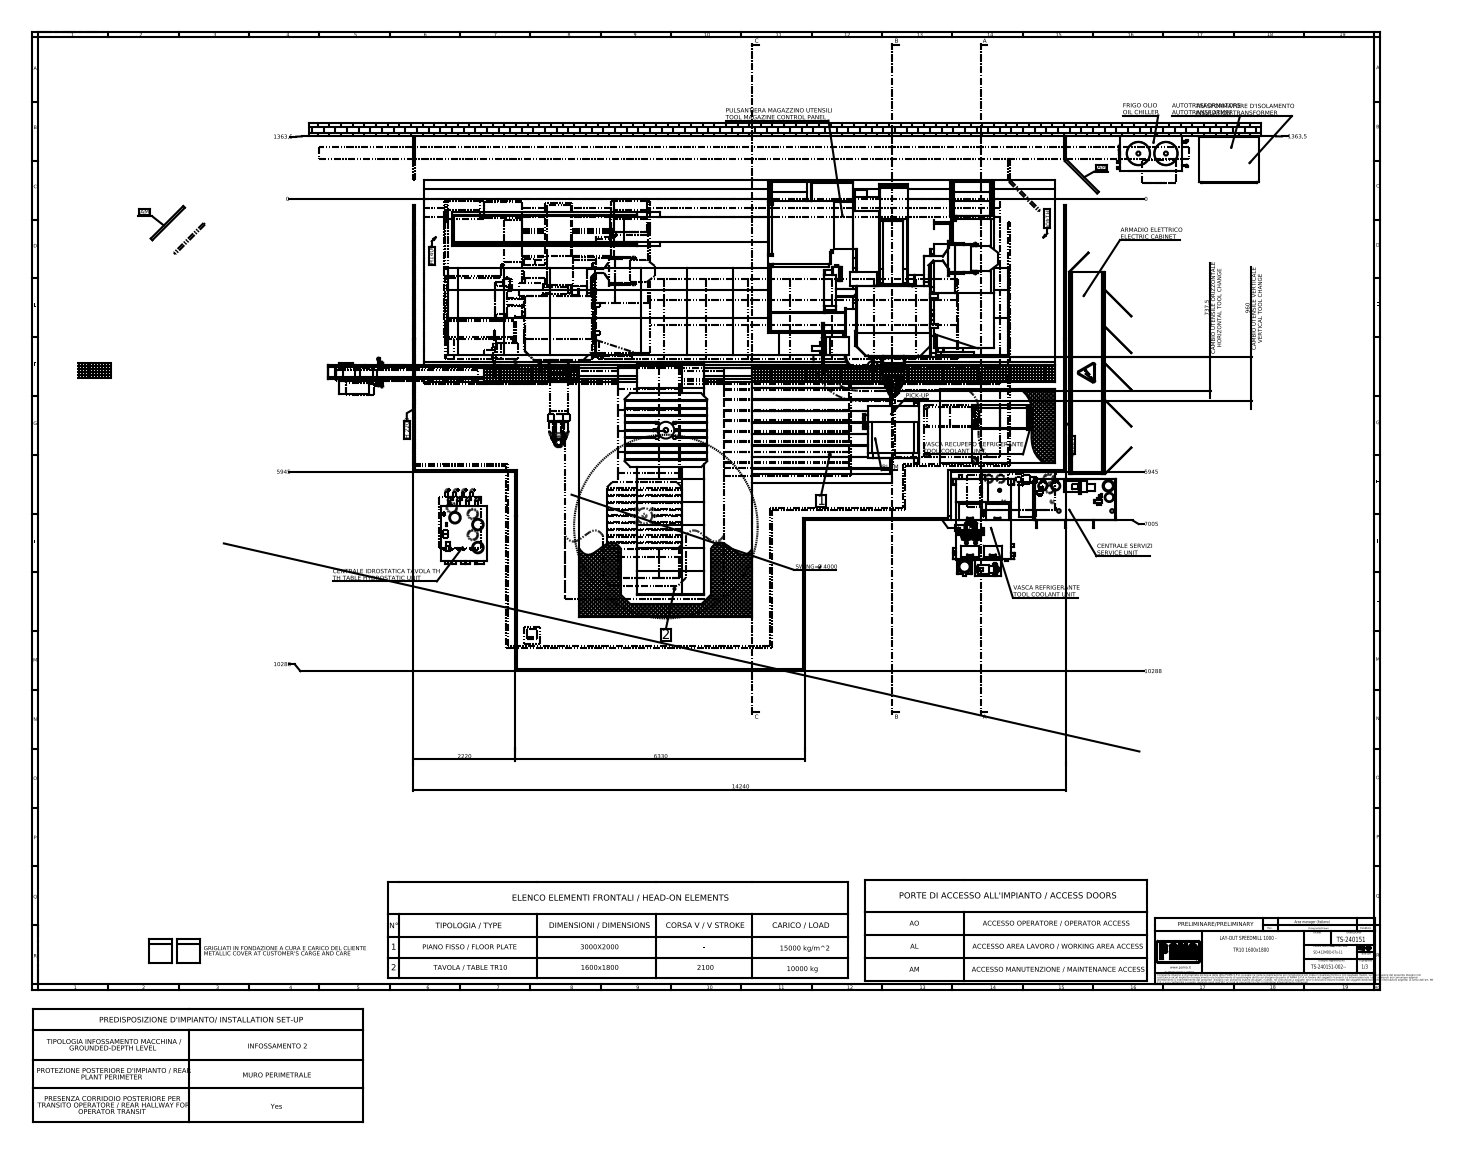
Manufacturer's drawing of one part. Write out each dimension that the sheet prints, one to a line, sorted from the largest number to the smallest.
14240
10288
10288
7005
6330
5945
5945
SWING= Ø 4000
2220
1363,5
1363,5
960 CAMBIO UTENSILE VERTICALE VERTICAL TOOL CHANGE
737,5 CAMBIO UTENSILE ORIZZONTALE HORIZONTAL TOOL CHANGE
0
0
